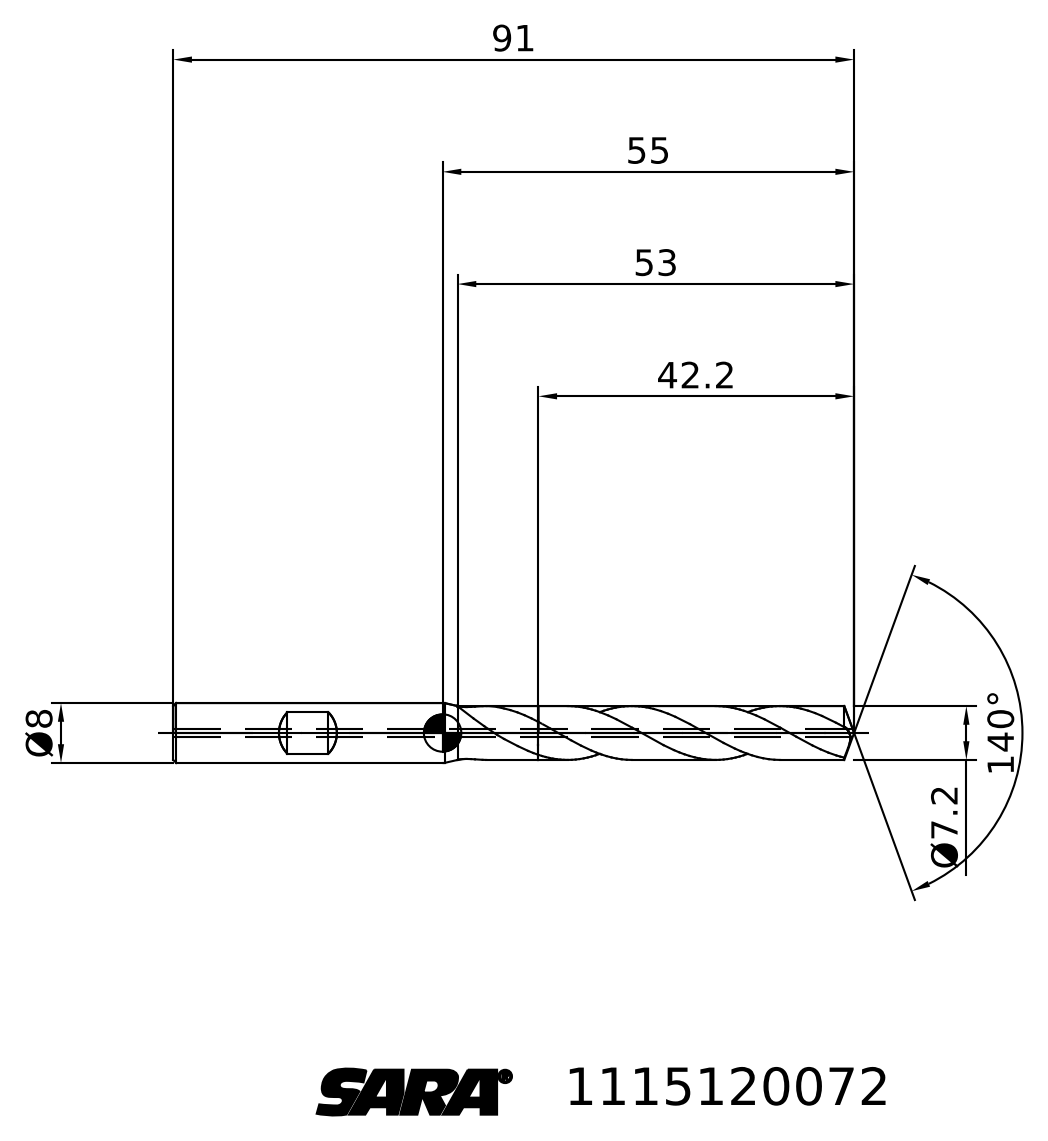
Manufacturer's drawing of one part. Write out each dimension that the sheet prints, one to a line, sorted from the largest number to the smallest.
140°
91
55
53
42.2
Ø8
Ø7.2
